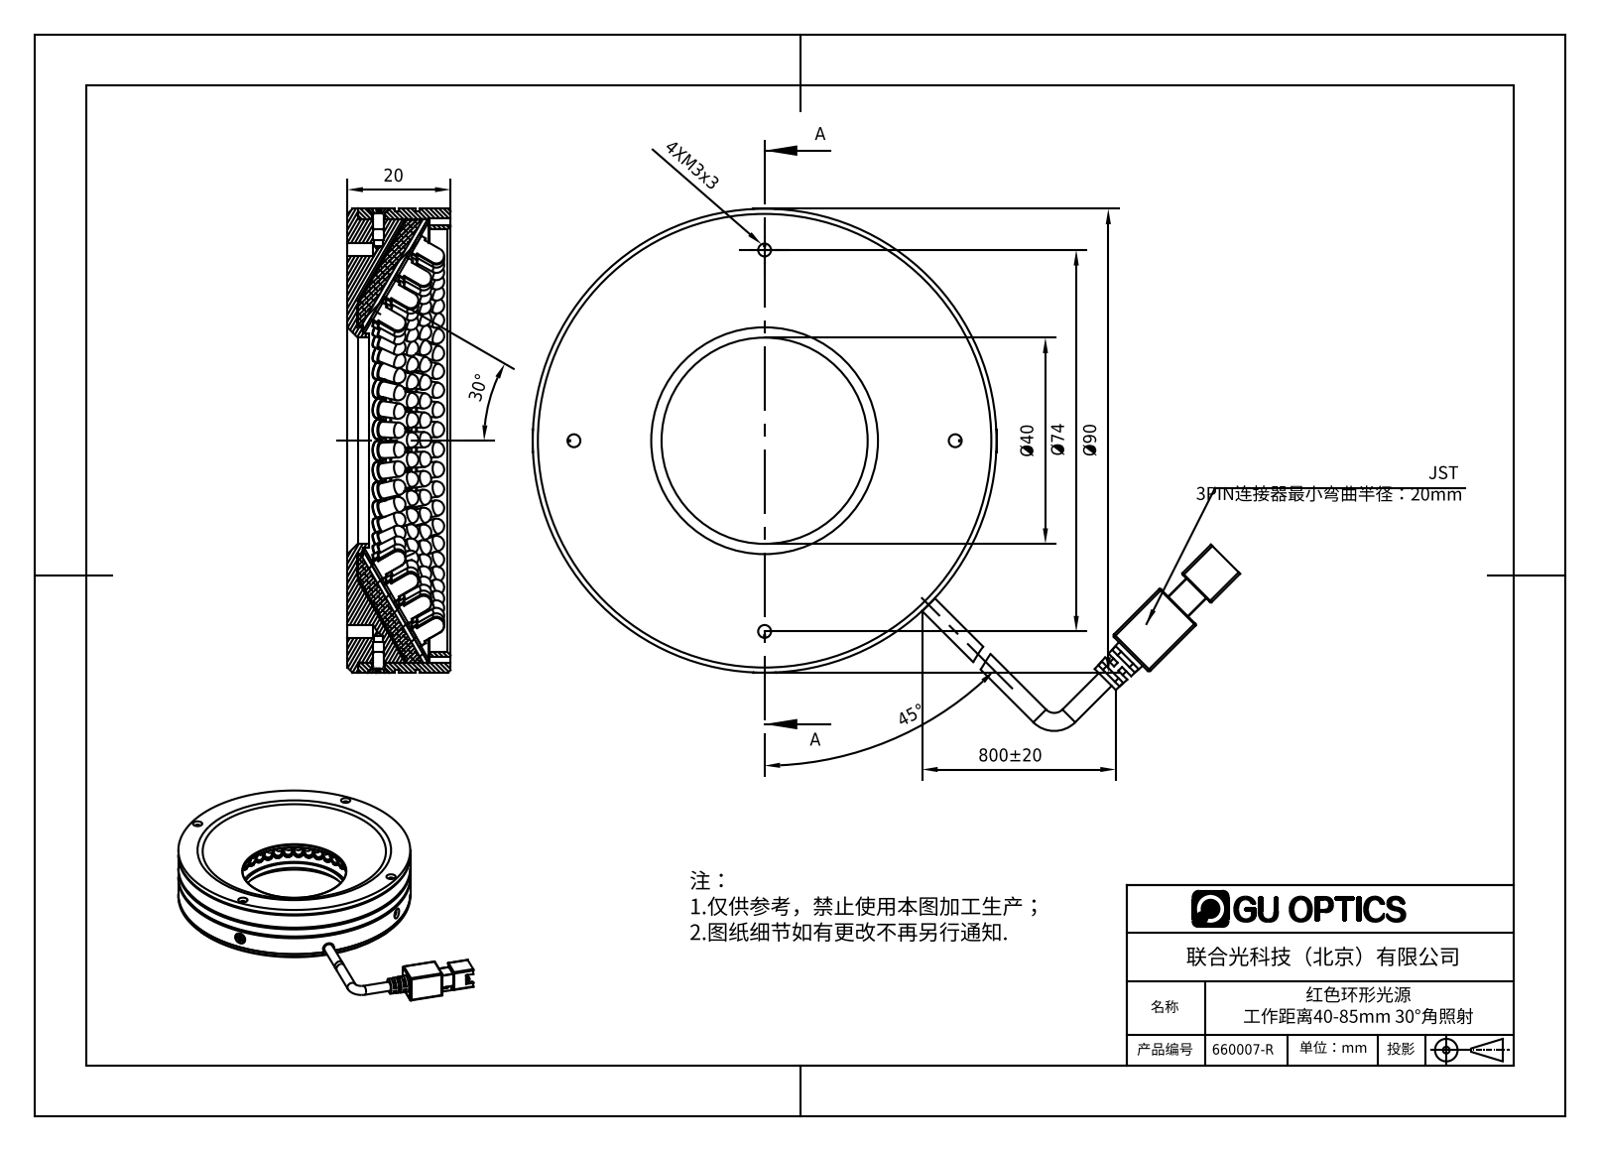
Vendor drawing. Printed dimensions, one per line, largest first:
800±20
Ø90
Ø74
45°
Ø40
30°
20
4XM3x3
